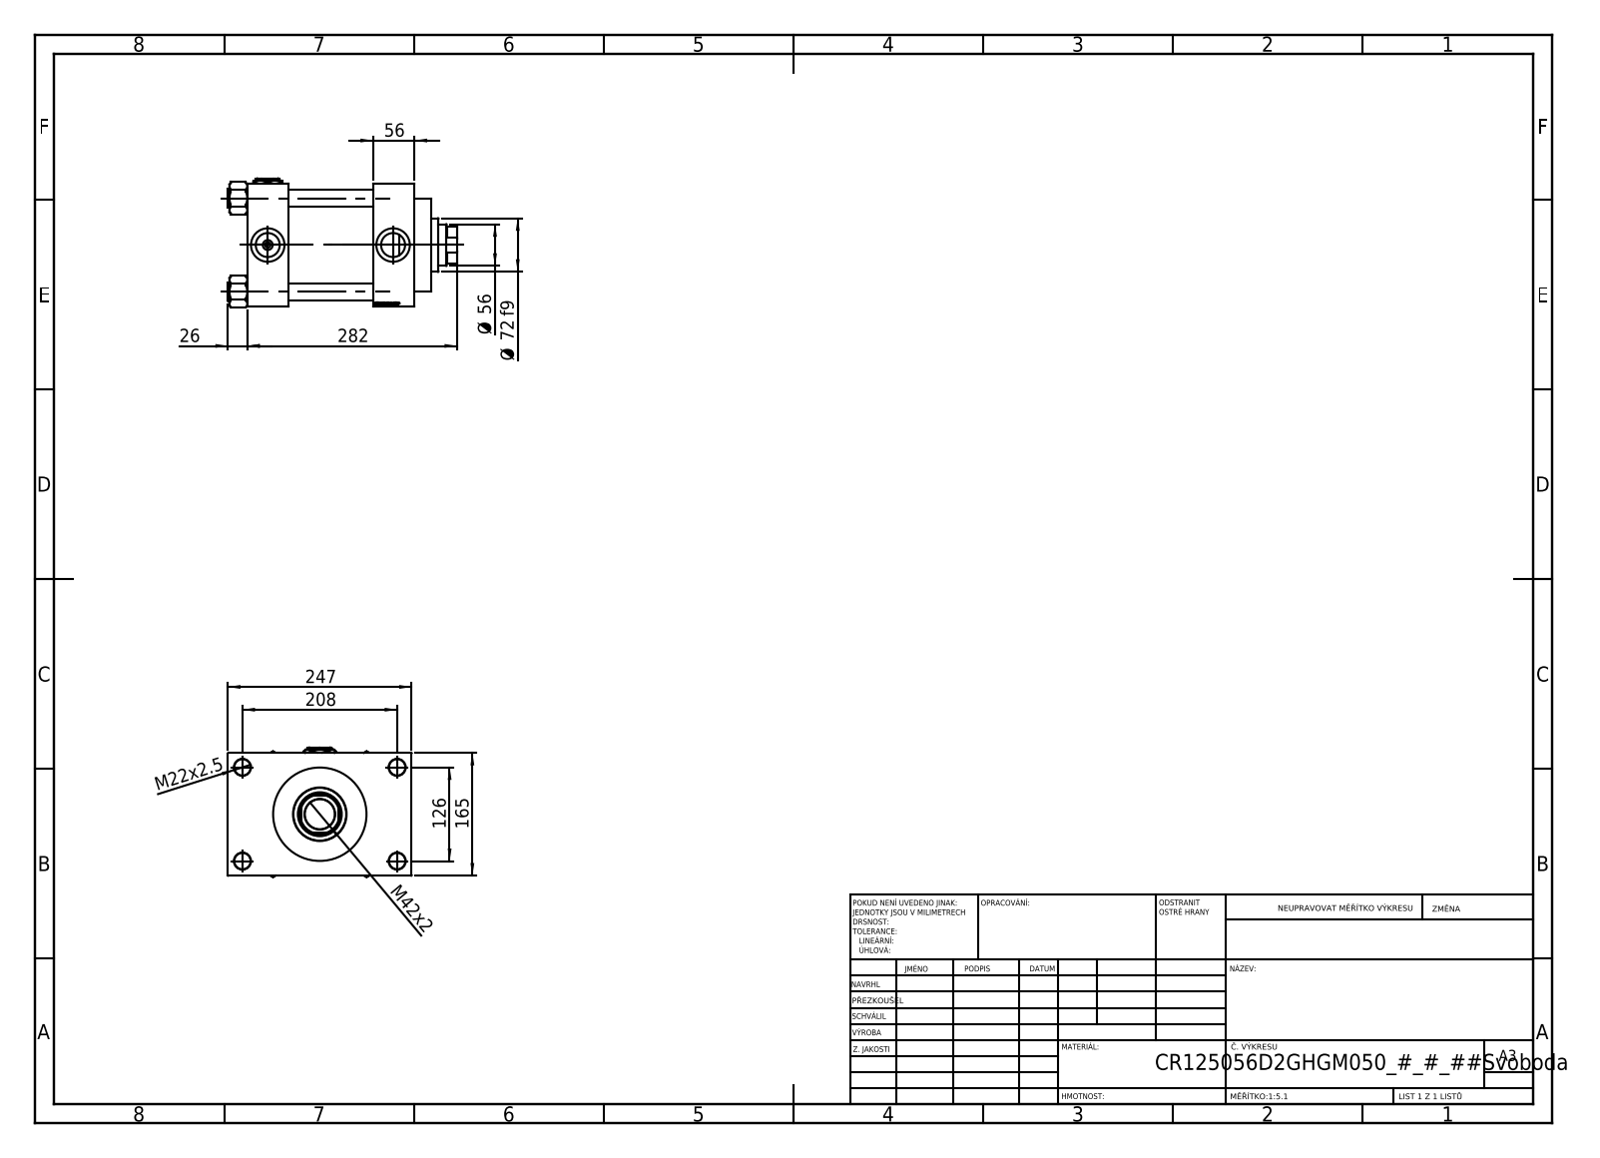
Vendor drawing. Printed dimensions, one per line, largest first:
282
247
208
165
126
Ø 72 f9
56
Ø 56
M42x2
26
M22x2.5
